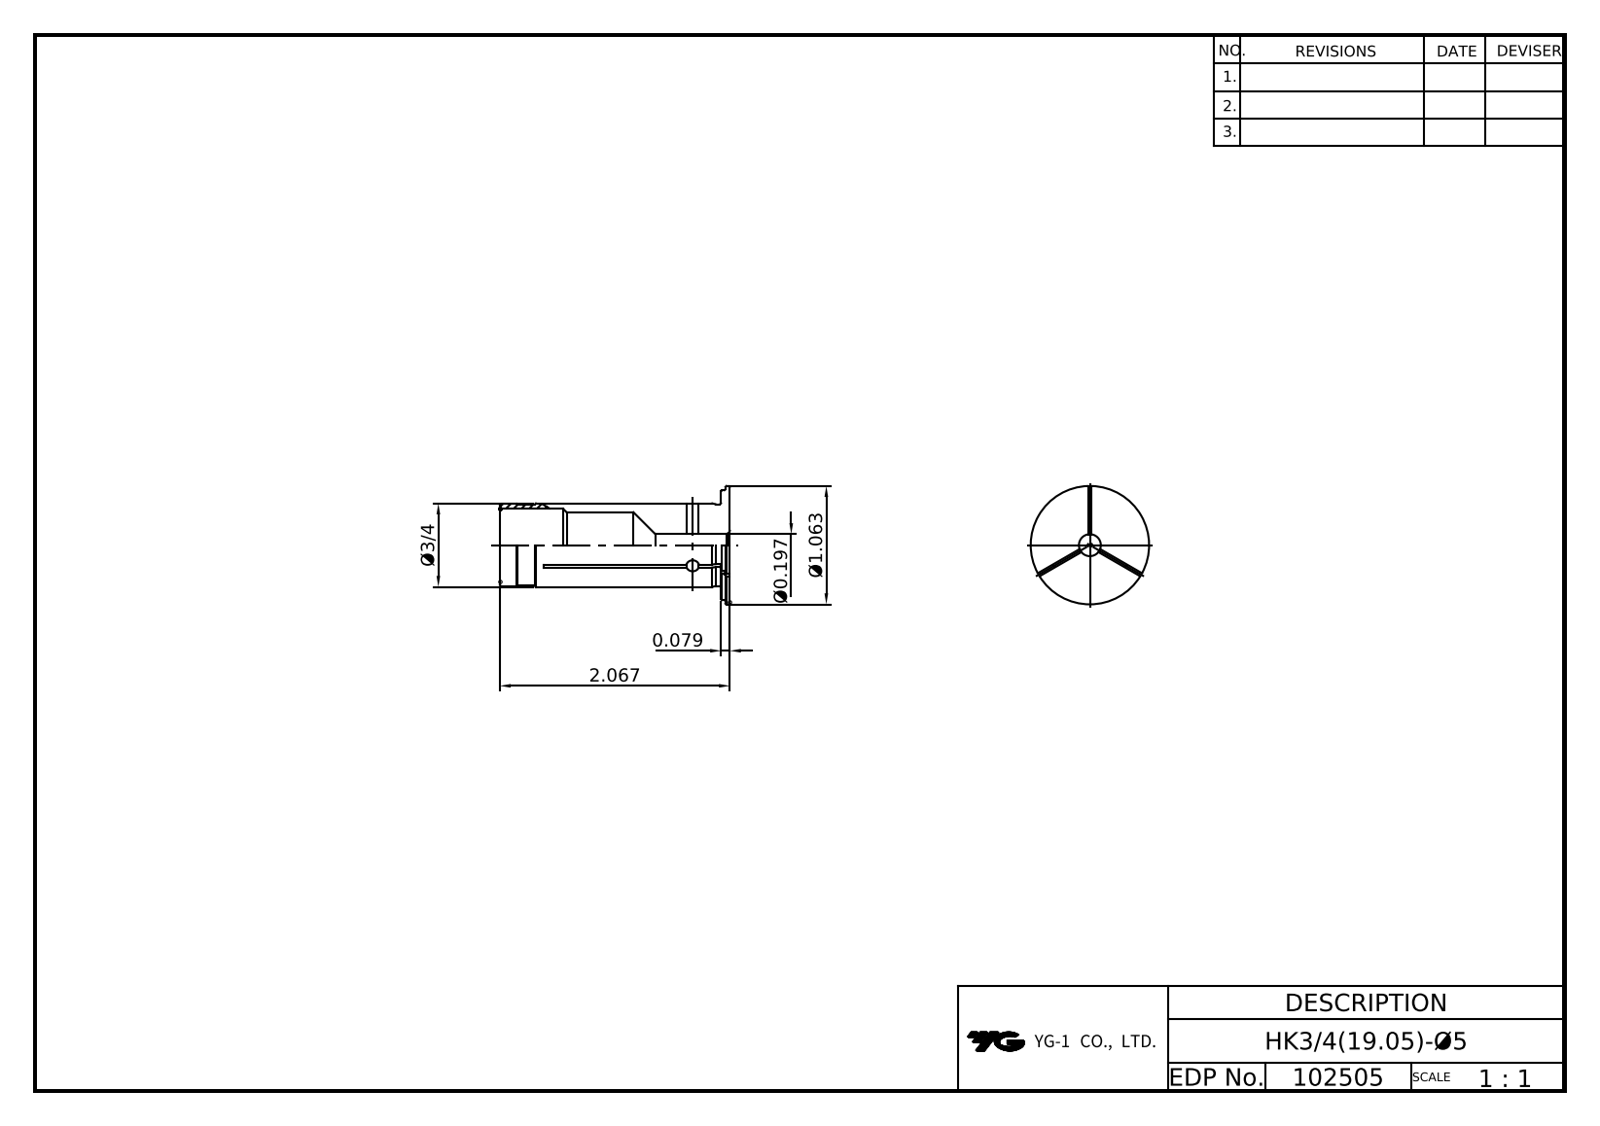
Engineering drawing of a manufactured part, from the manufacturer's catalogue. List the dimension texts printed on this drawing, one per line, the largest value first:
2.067
Ø1.063
Ø3/4
0.079
